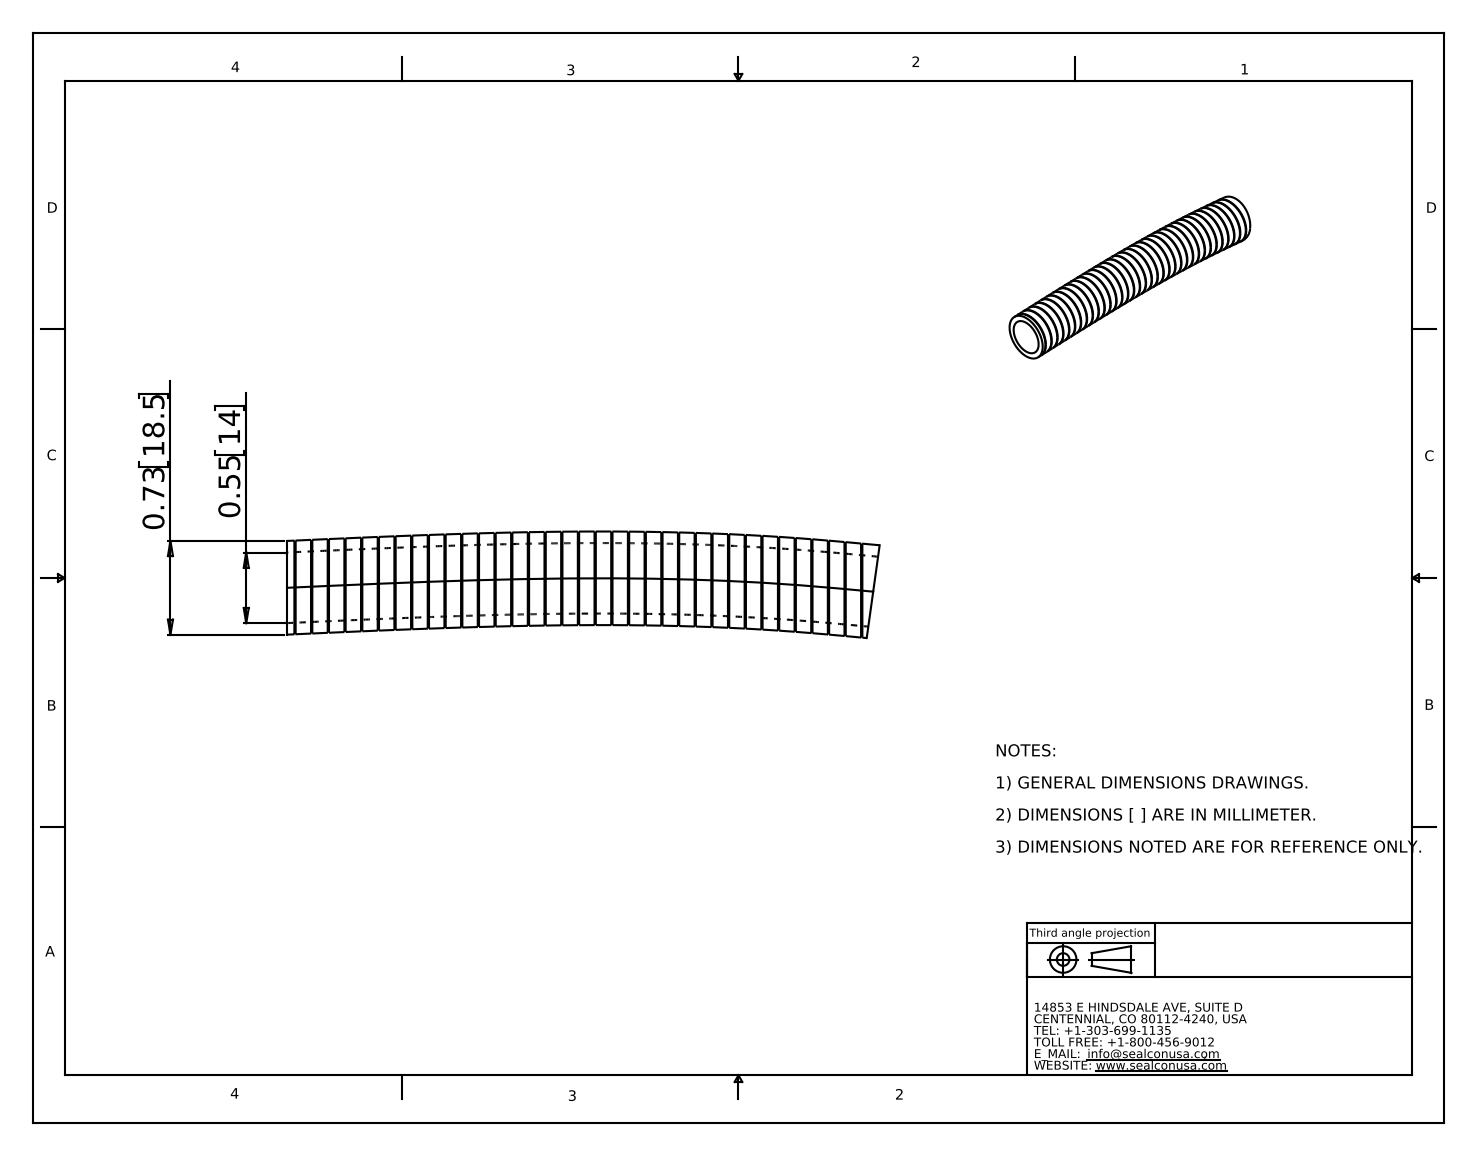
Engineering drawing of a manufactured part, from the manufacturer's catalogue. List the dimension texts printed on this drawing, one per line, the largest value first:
0.73 18.5
0.55 14
